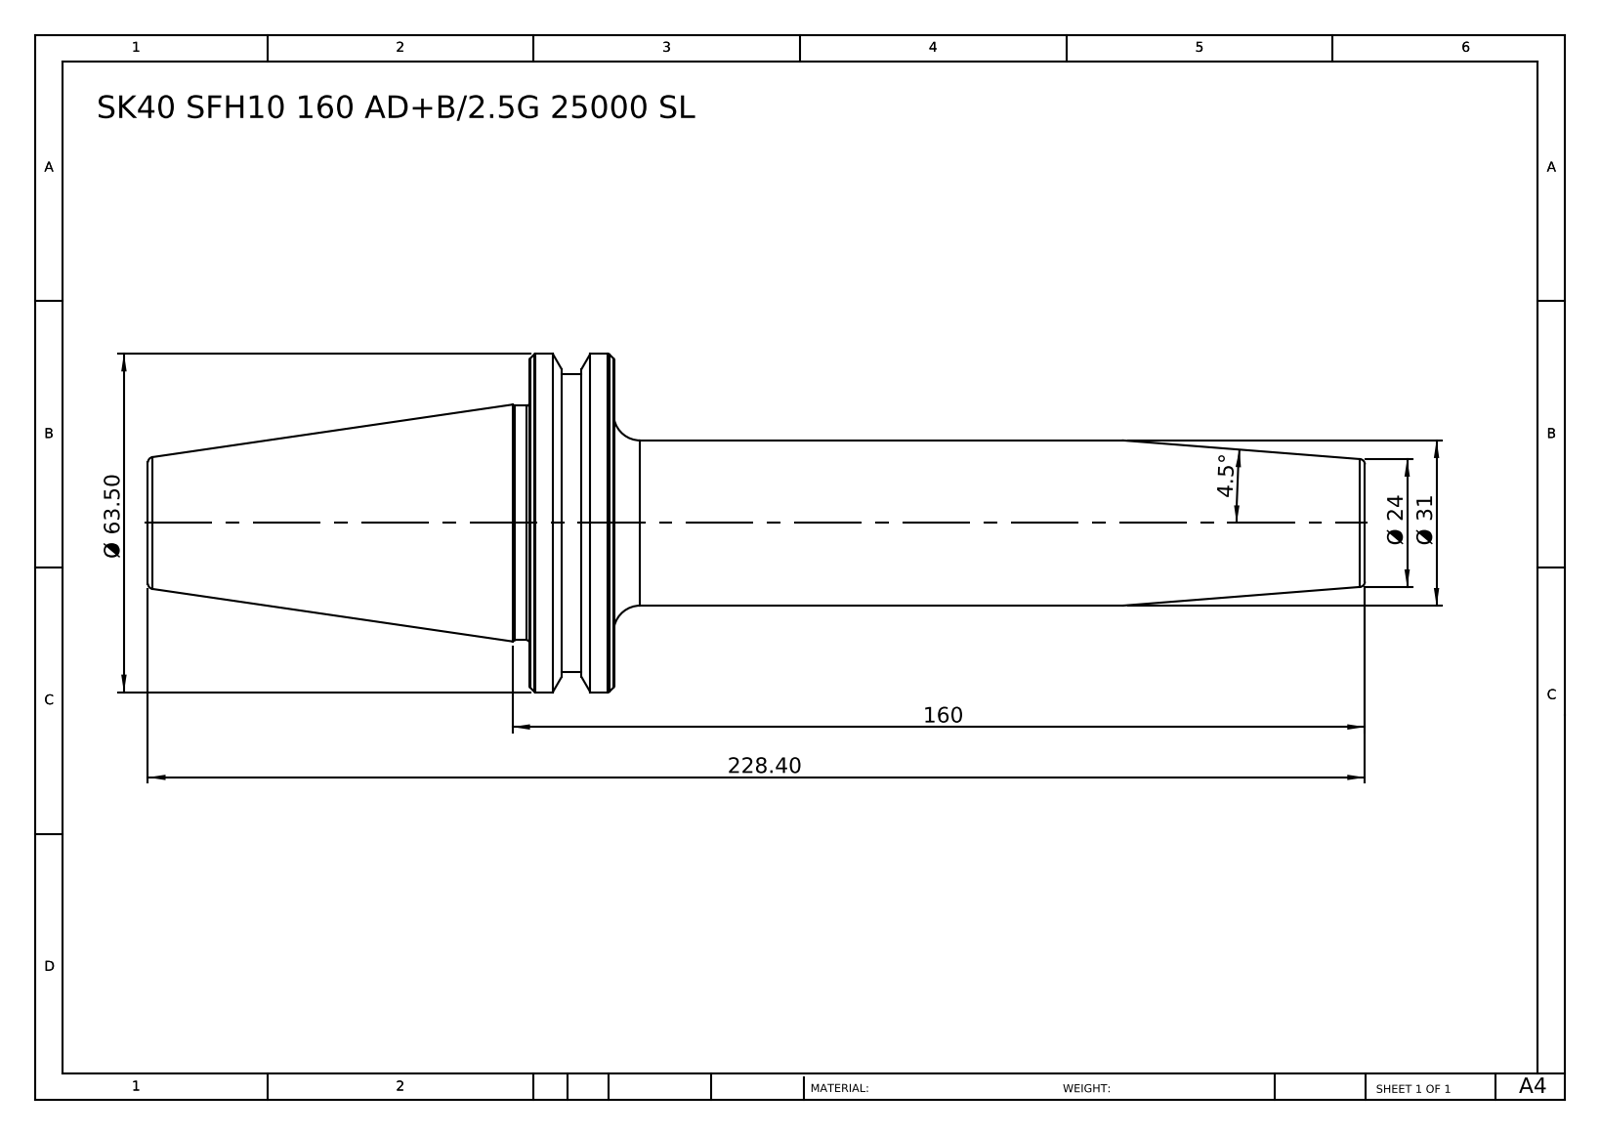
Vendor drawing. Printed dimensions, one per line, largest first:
228.40
160
Ø 63.50
Ø 31
Ø 24
4.5°
